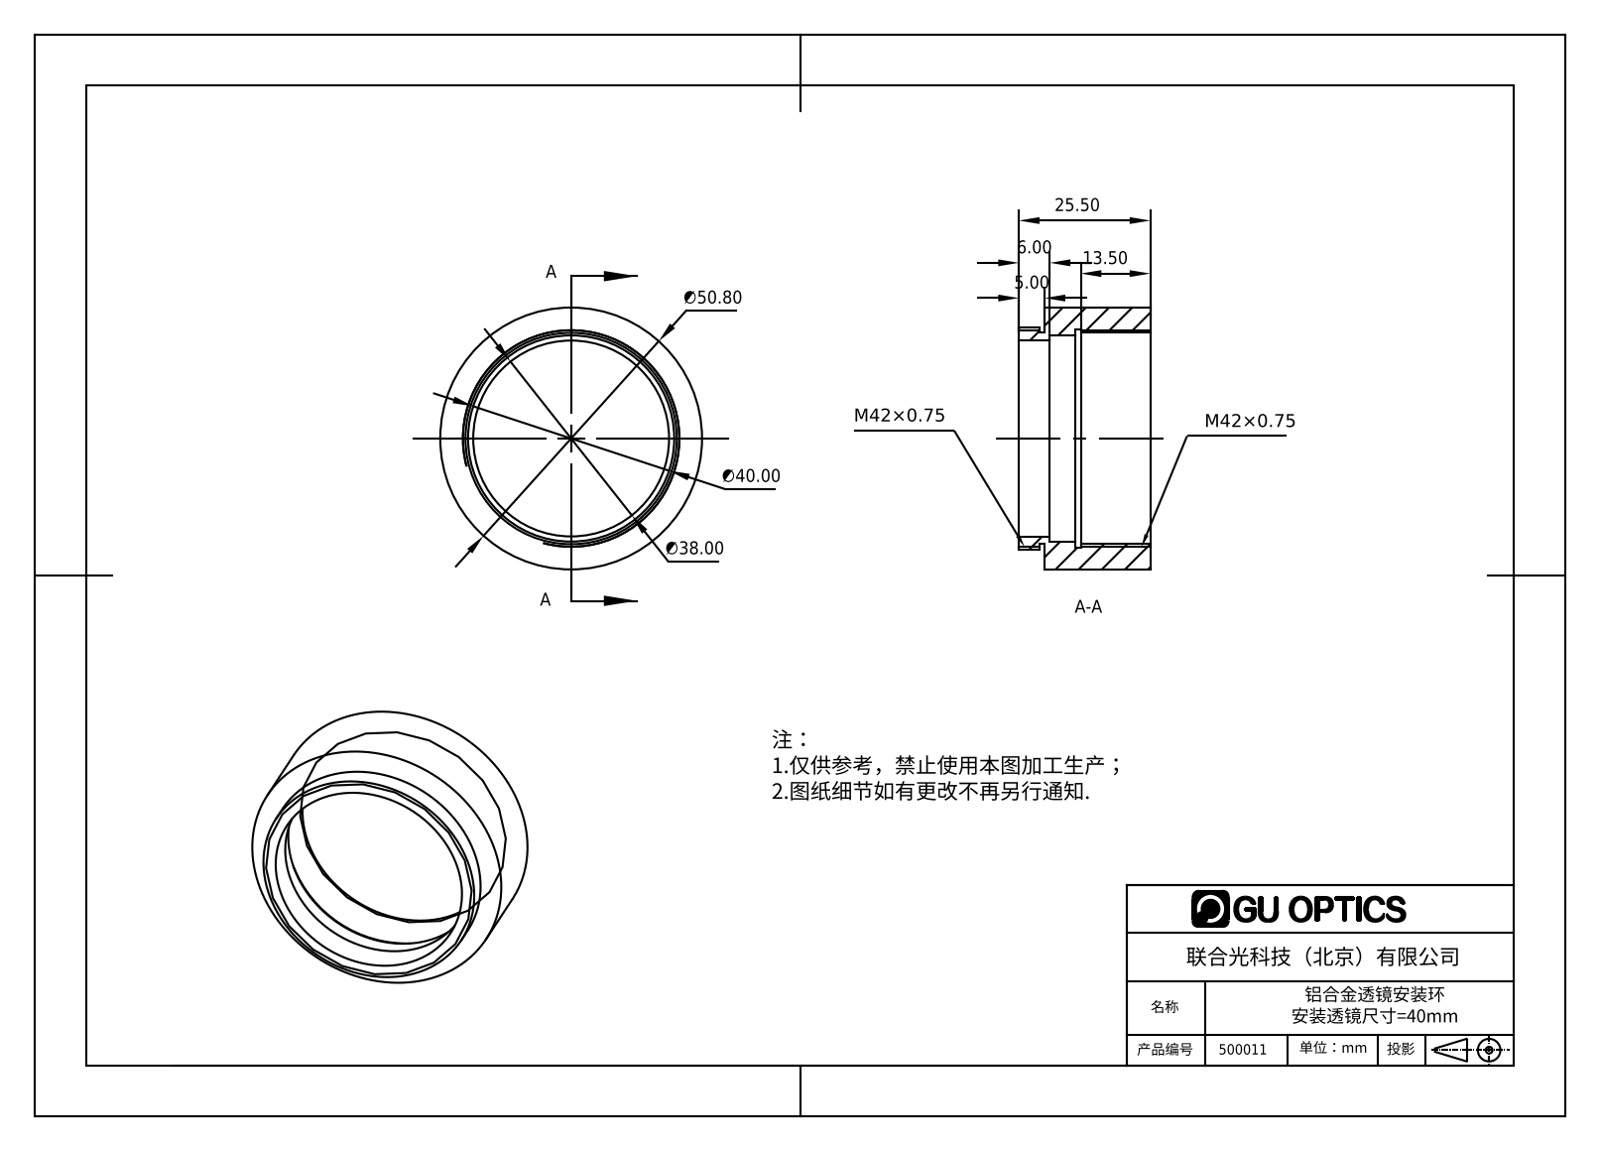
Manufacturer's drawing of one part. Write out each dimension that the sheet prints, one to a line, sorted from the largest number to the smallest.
∅50.80
∅40.00
∅38.00
25.50
13.50
6.00
5.00
